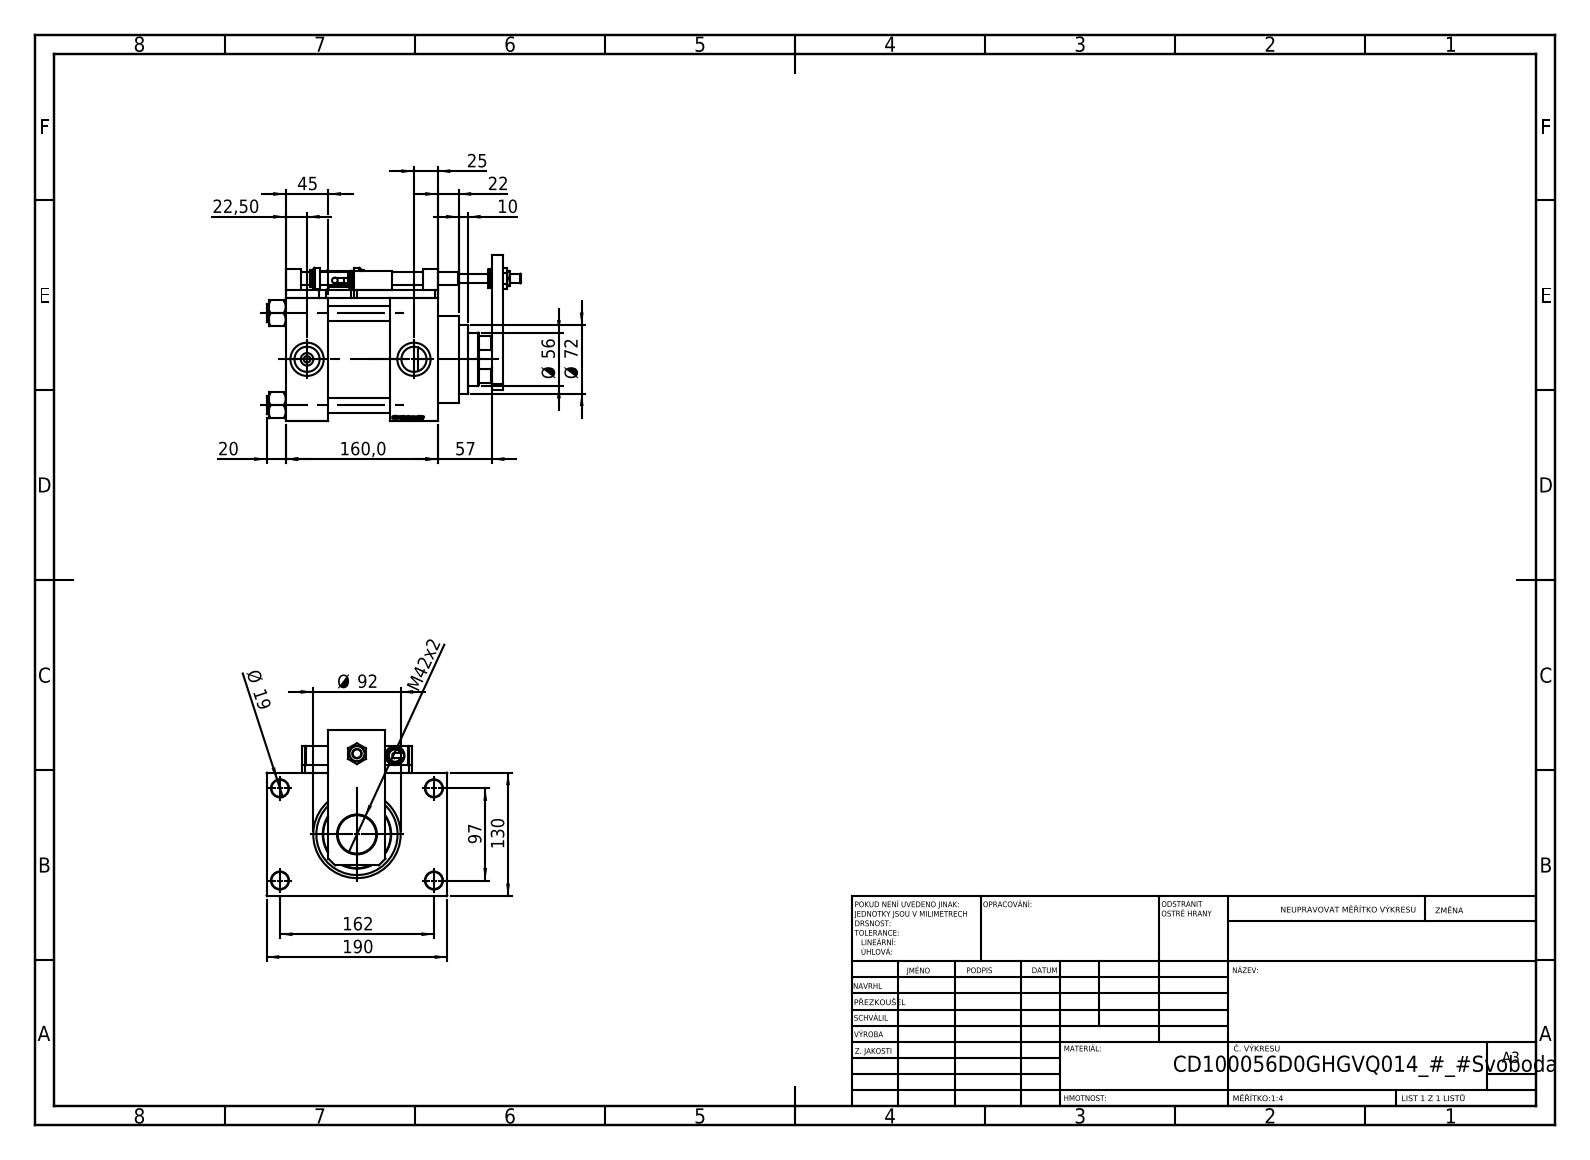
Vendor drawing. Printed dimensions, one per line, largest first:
190
162
160,0
130
97
Ø 92
Ø 72
57
Ø 56
45
M42x2
25
22,50
22
20
Ø 19
10
